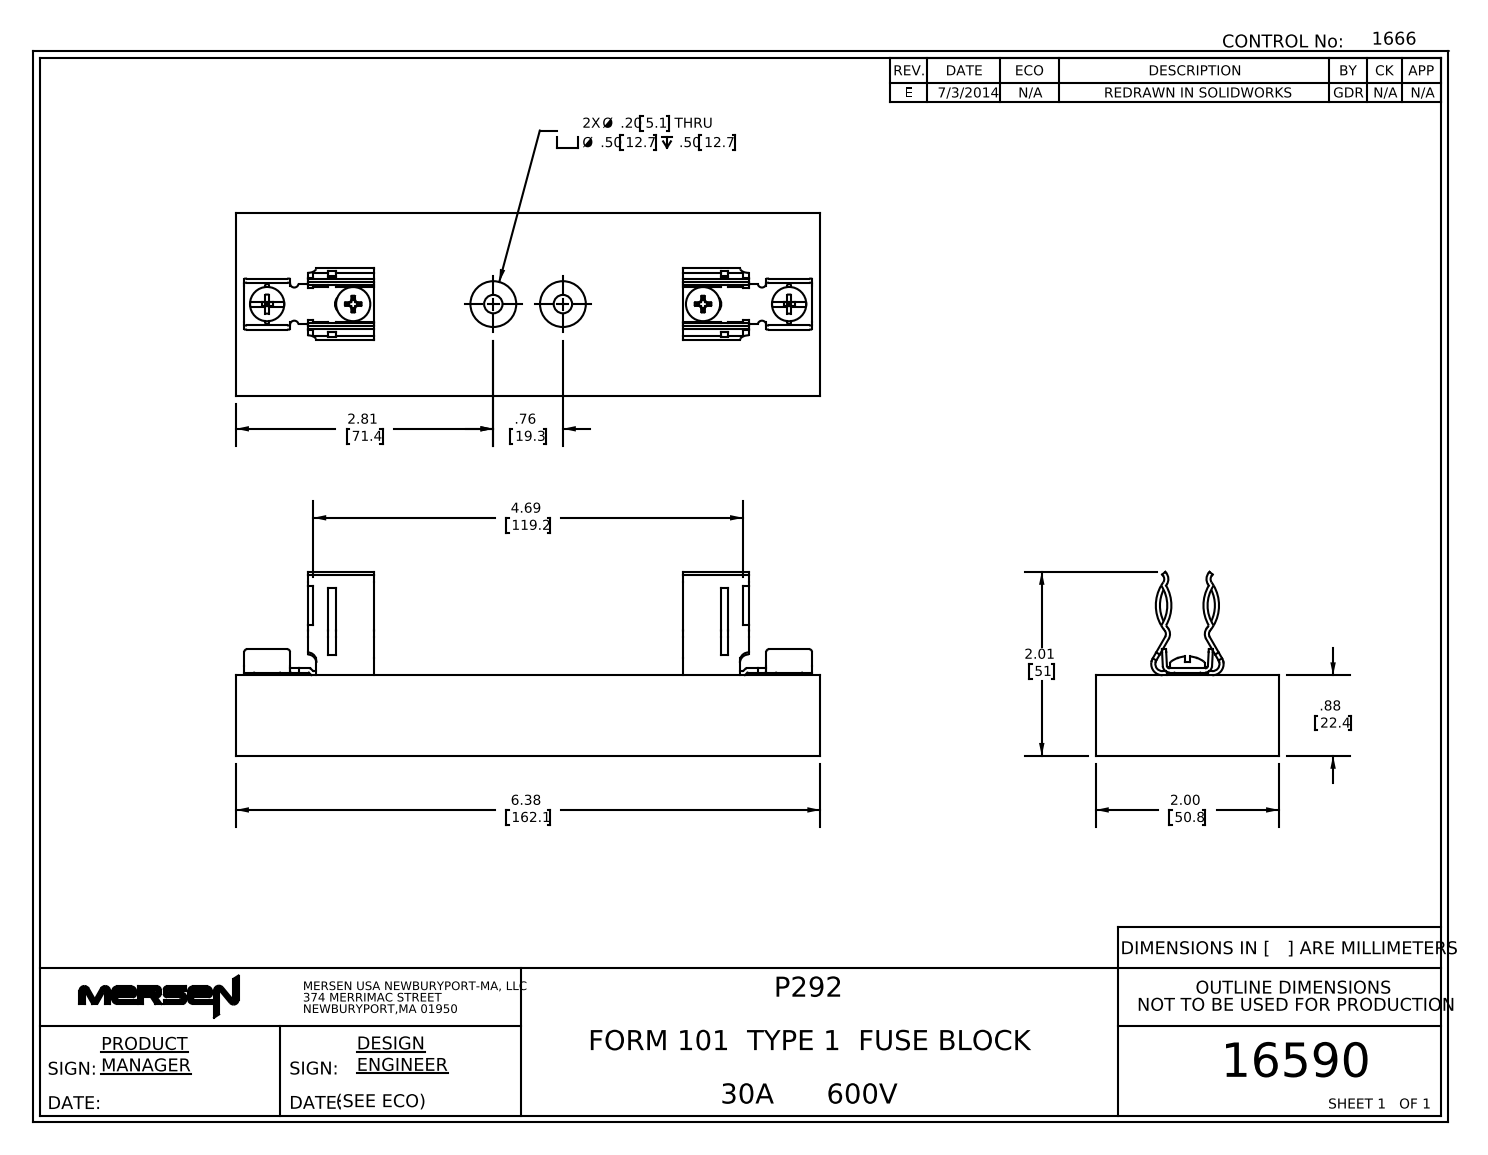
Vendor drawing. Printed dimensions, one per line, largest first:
6.38 162.1
4.69 119.2
2.81 71.4
2.01 51
2.00 50.8
.88 22.4
.76 19.3
2X Ø .20 5.1 THRU Ø .50 12.7 .50 12.7
